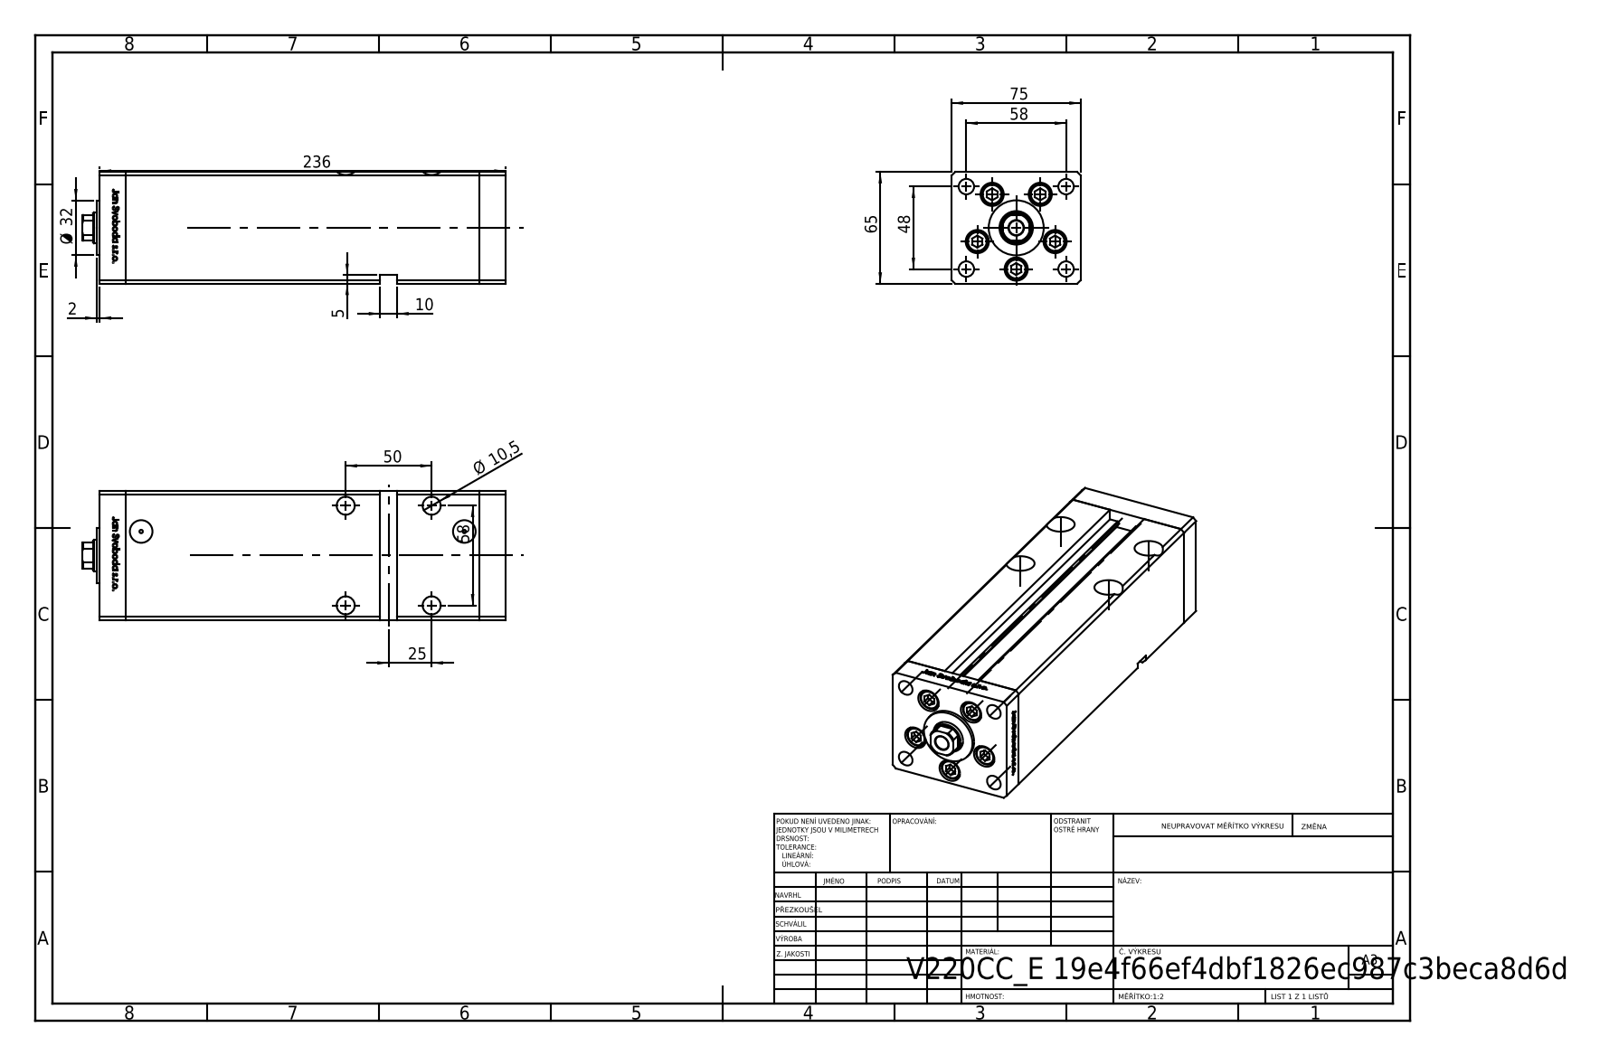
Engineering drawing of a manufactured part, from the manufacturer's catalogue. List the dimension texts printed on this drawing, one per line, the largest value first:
236
75
65
58
58
50
48
Ø 32
25
Ø 10,5
10
5
2
